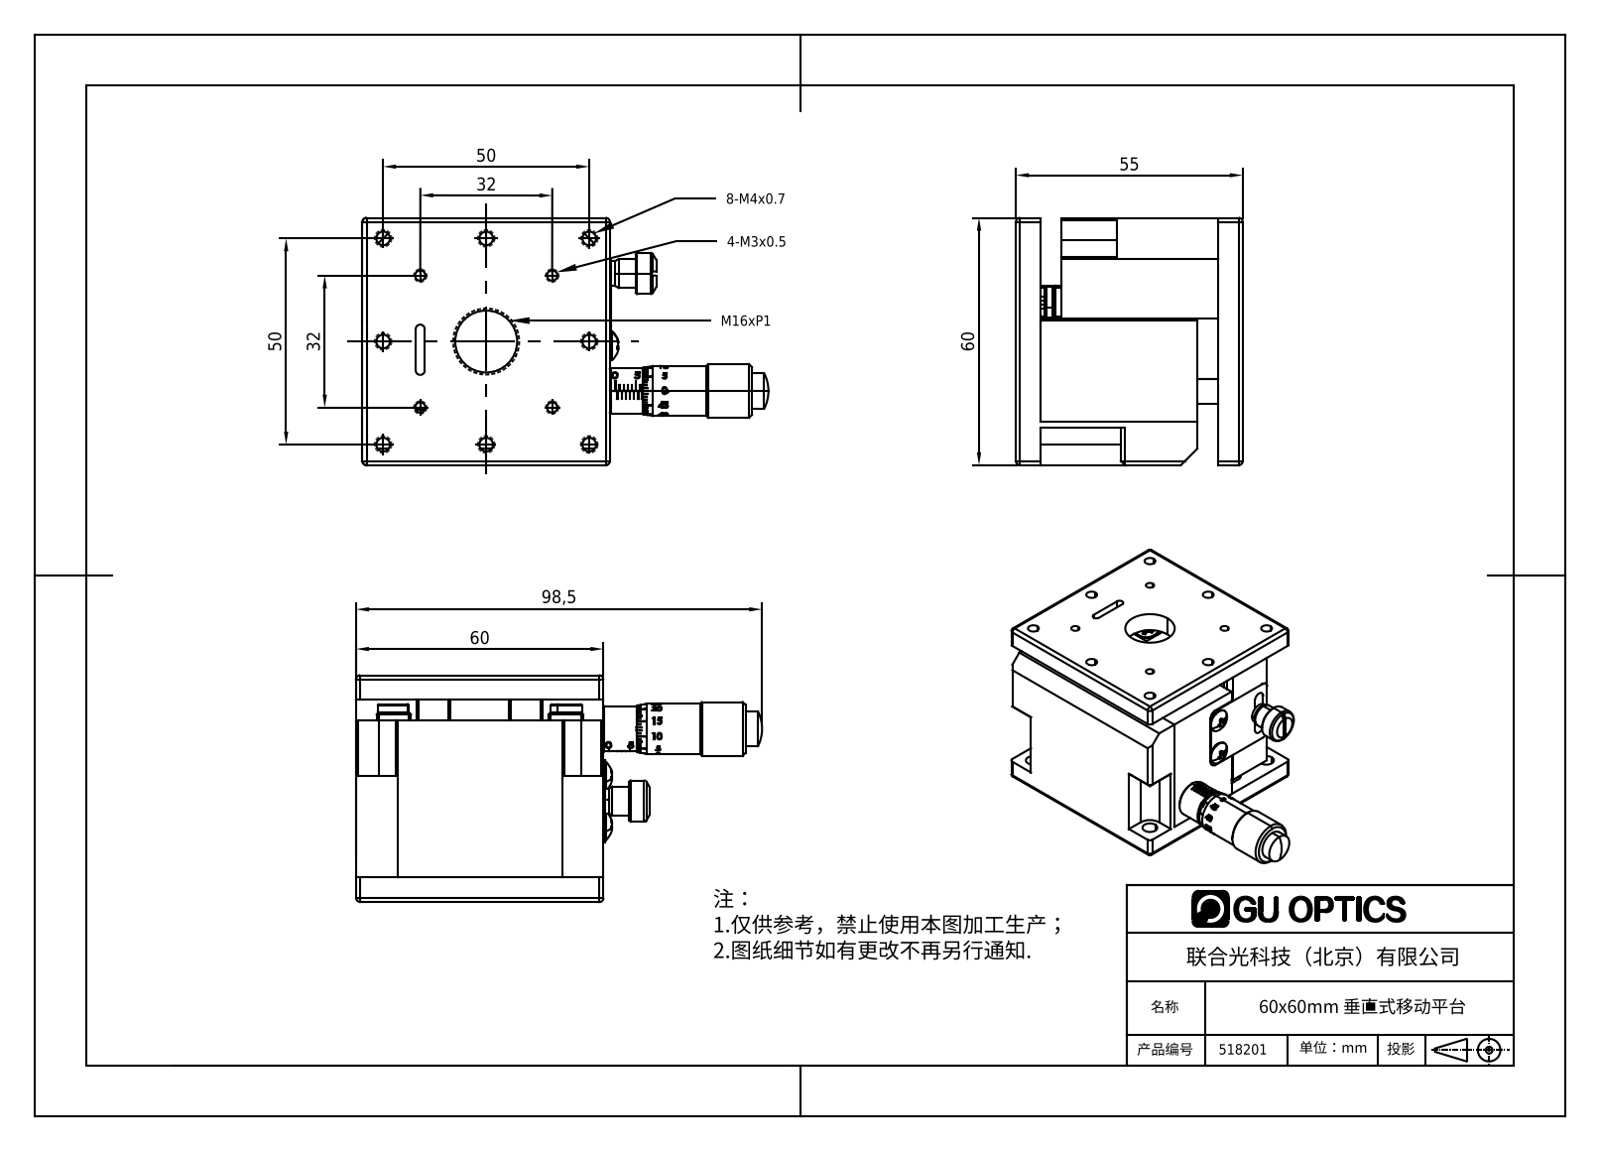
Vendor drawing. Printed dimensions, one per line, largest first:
98,5
60
60
55
50
50
32
32
